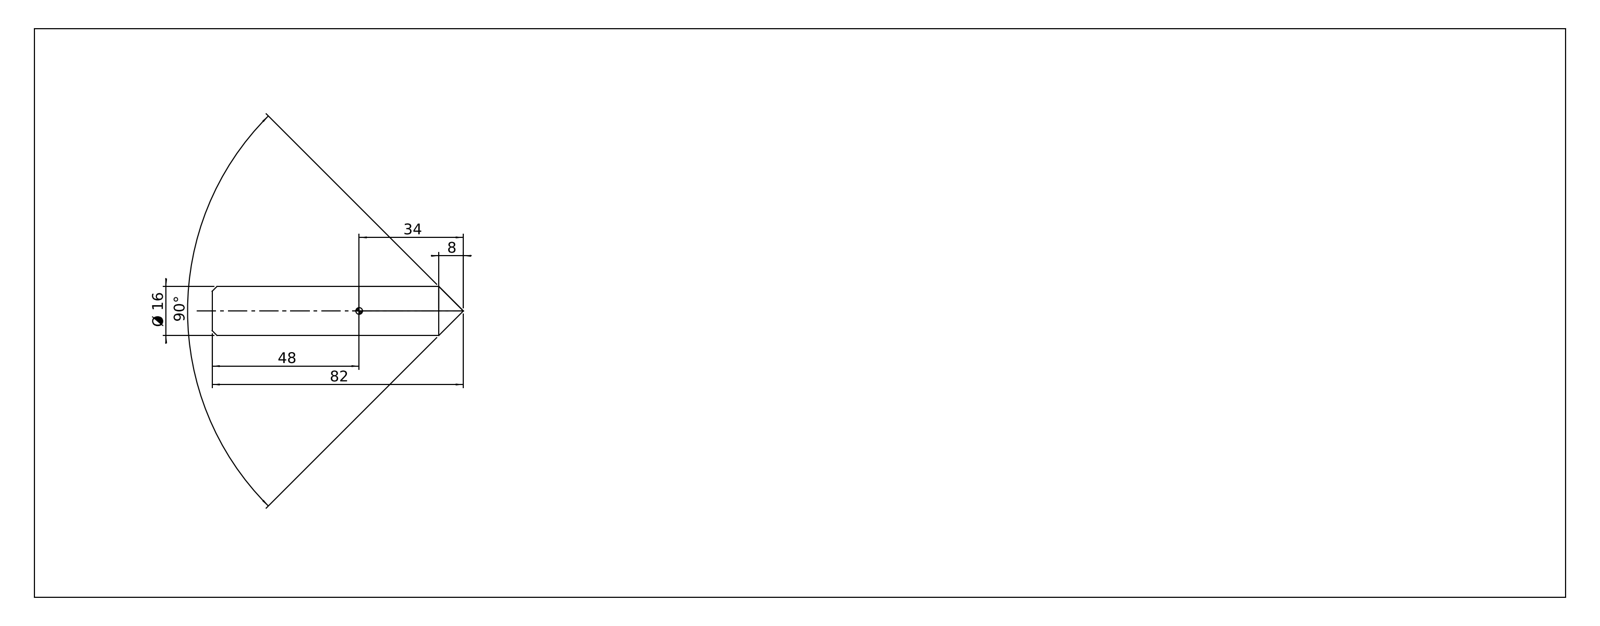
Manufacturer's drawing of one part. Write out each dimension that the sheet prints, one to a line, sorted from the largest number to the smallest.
90°
82
48
34
Ø 16
8
